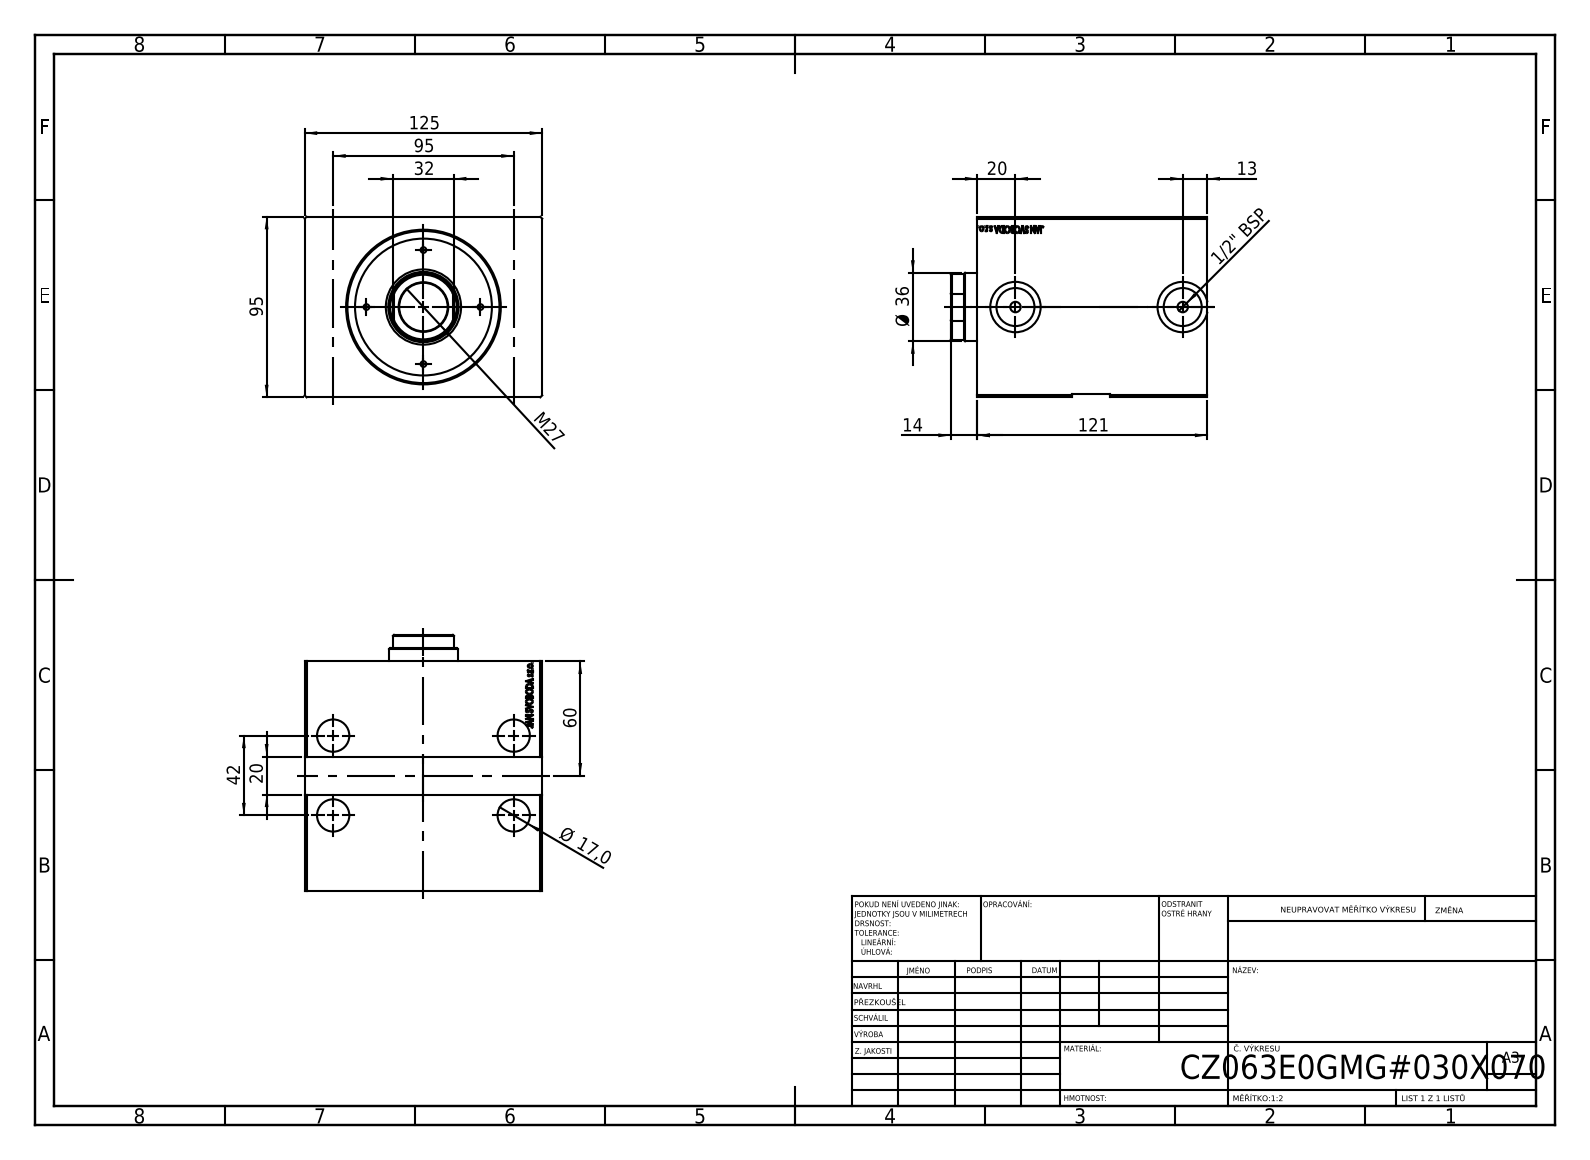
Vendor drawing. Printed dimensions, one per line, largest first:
125
121
95
95
60
42
Ø 36
32
M27
20
20
Ø 17,0
14
13
1/2" BSP
